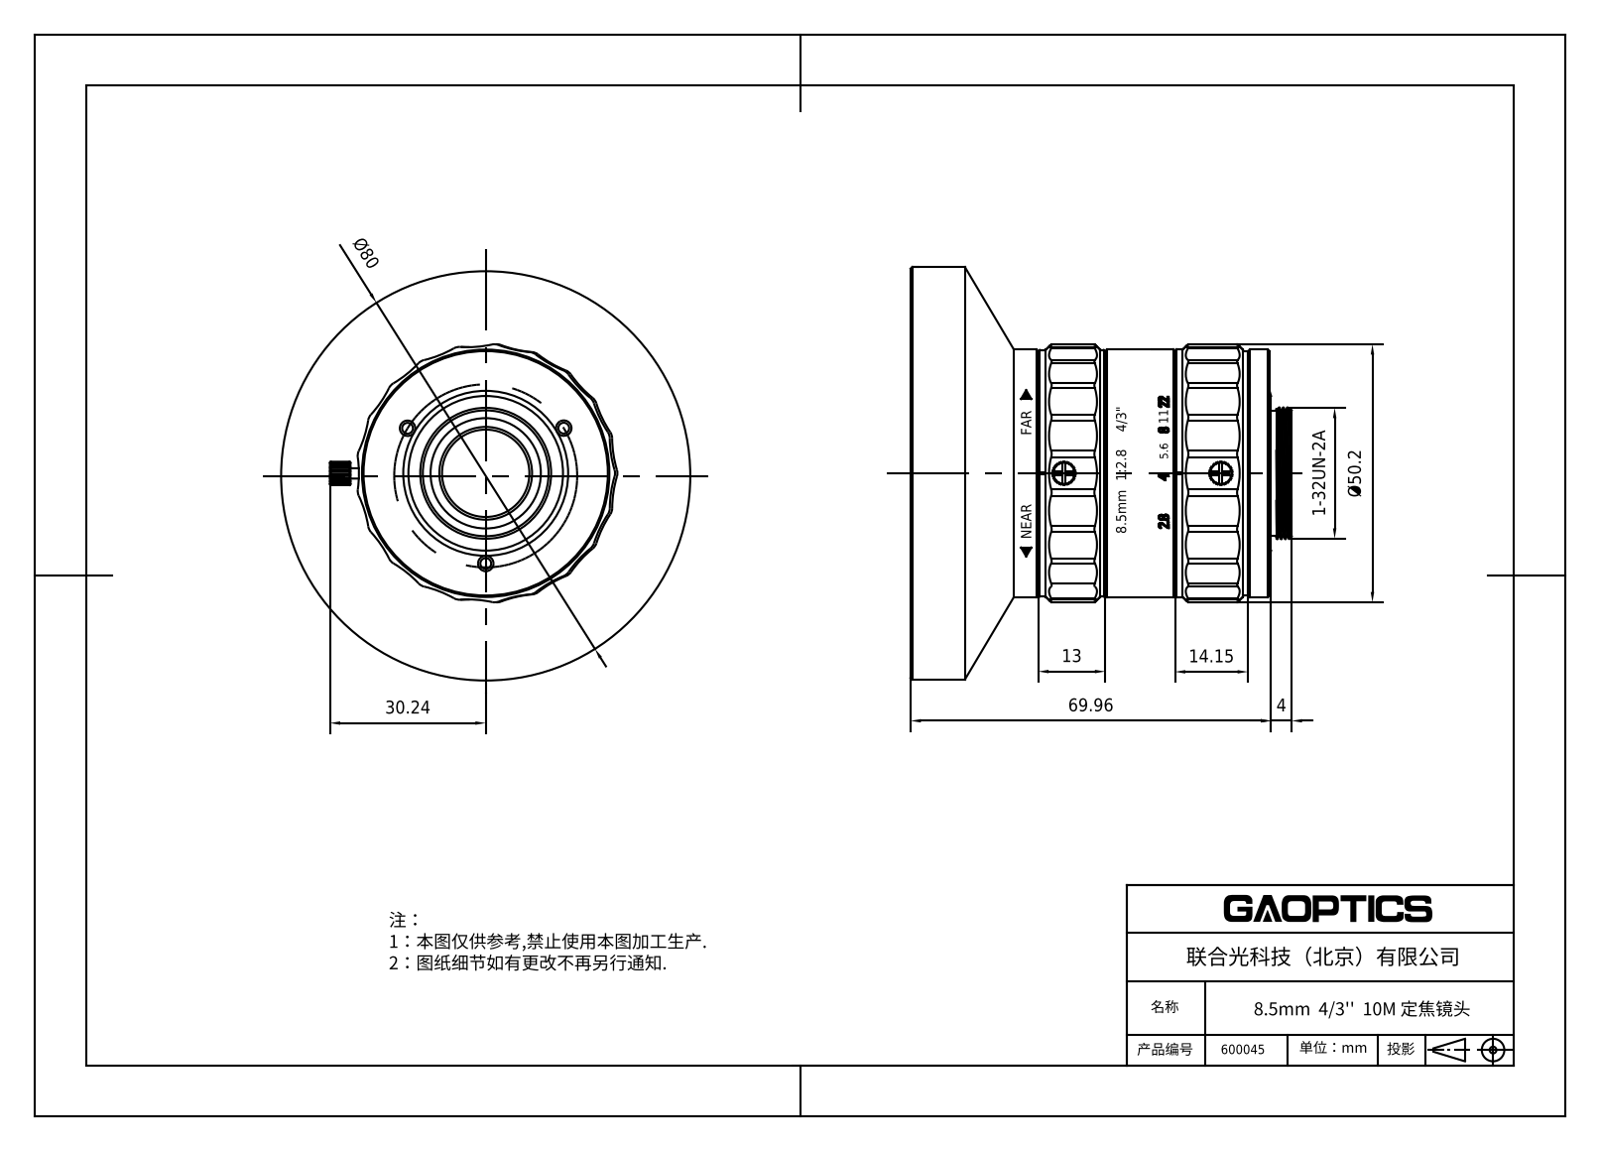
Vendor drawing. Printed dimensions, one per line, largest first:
Ø80
69.96
Ø50.2
30.24
14.15
13
4
1-32UN-2A
